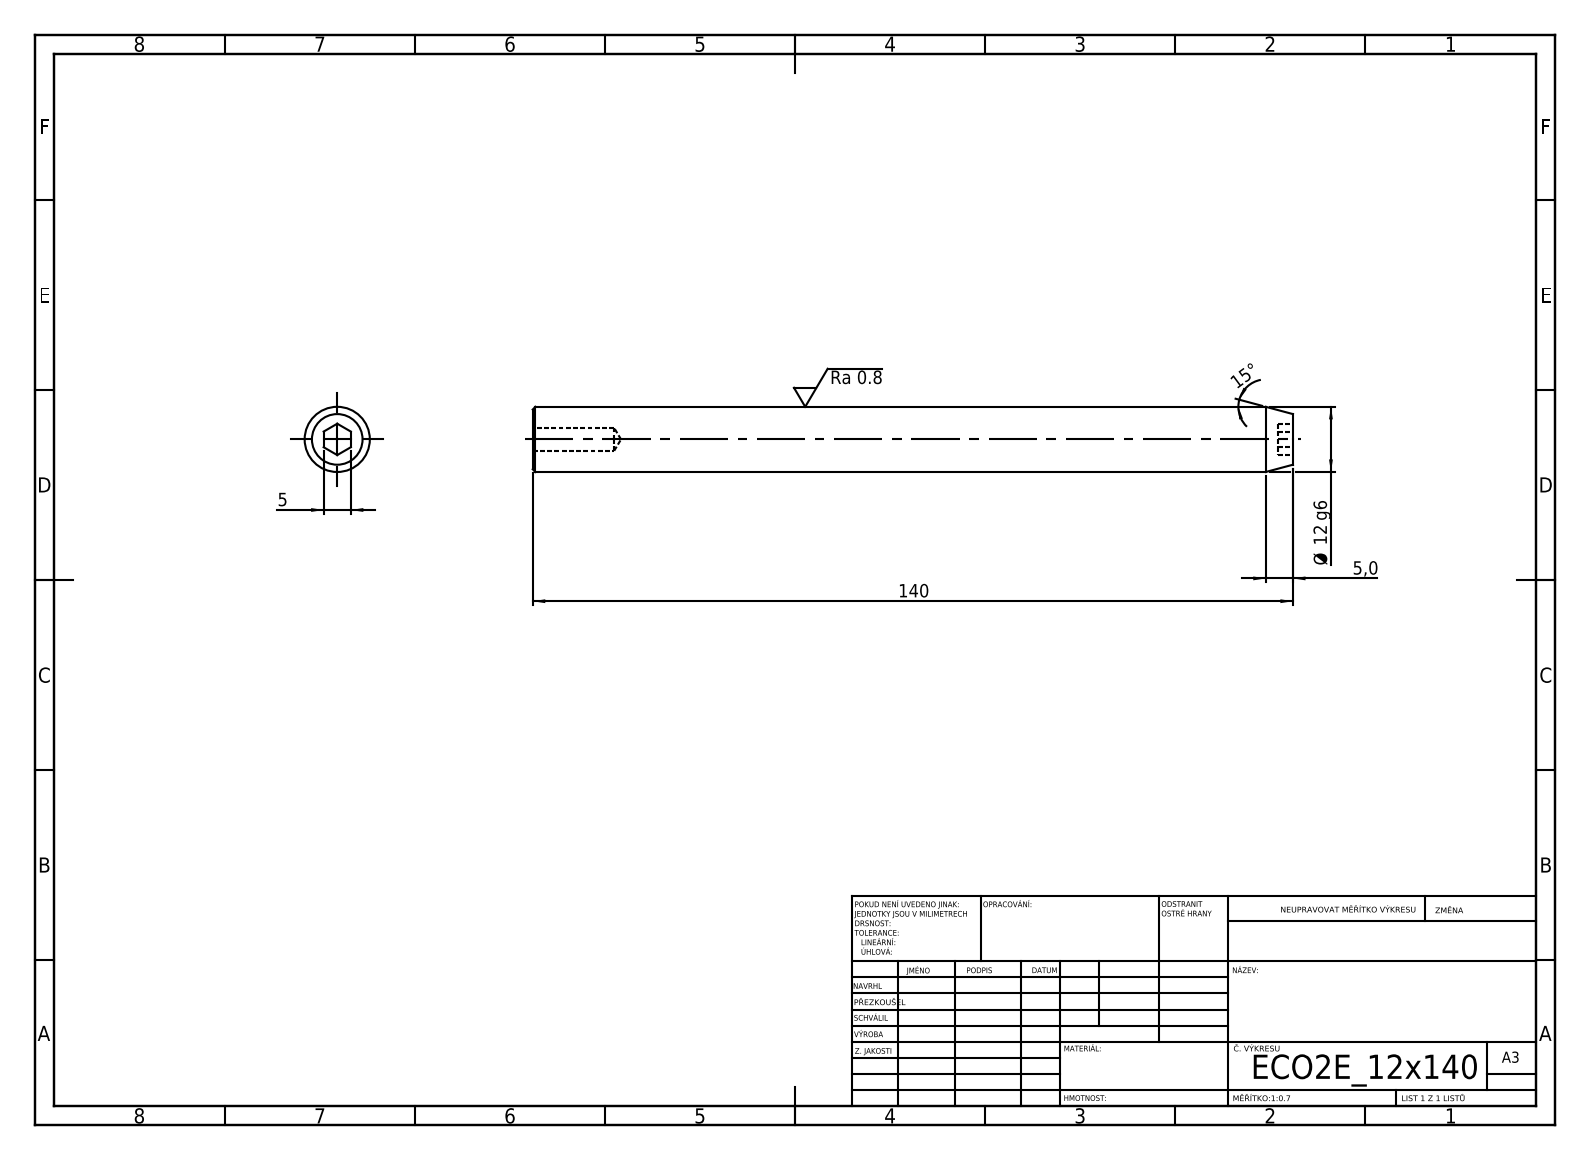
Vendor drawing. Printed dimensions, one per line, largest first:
140
15°
Ø 12 g6
5,0
5
